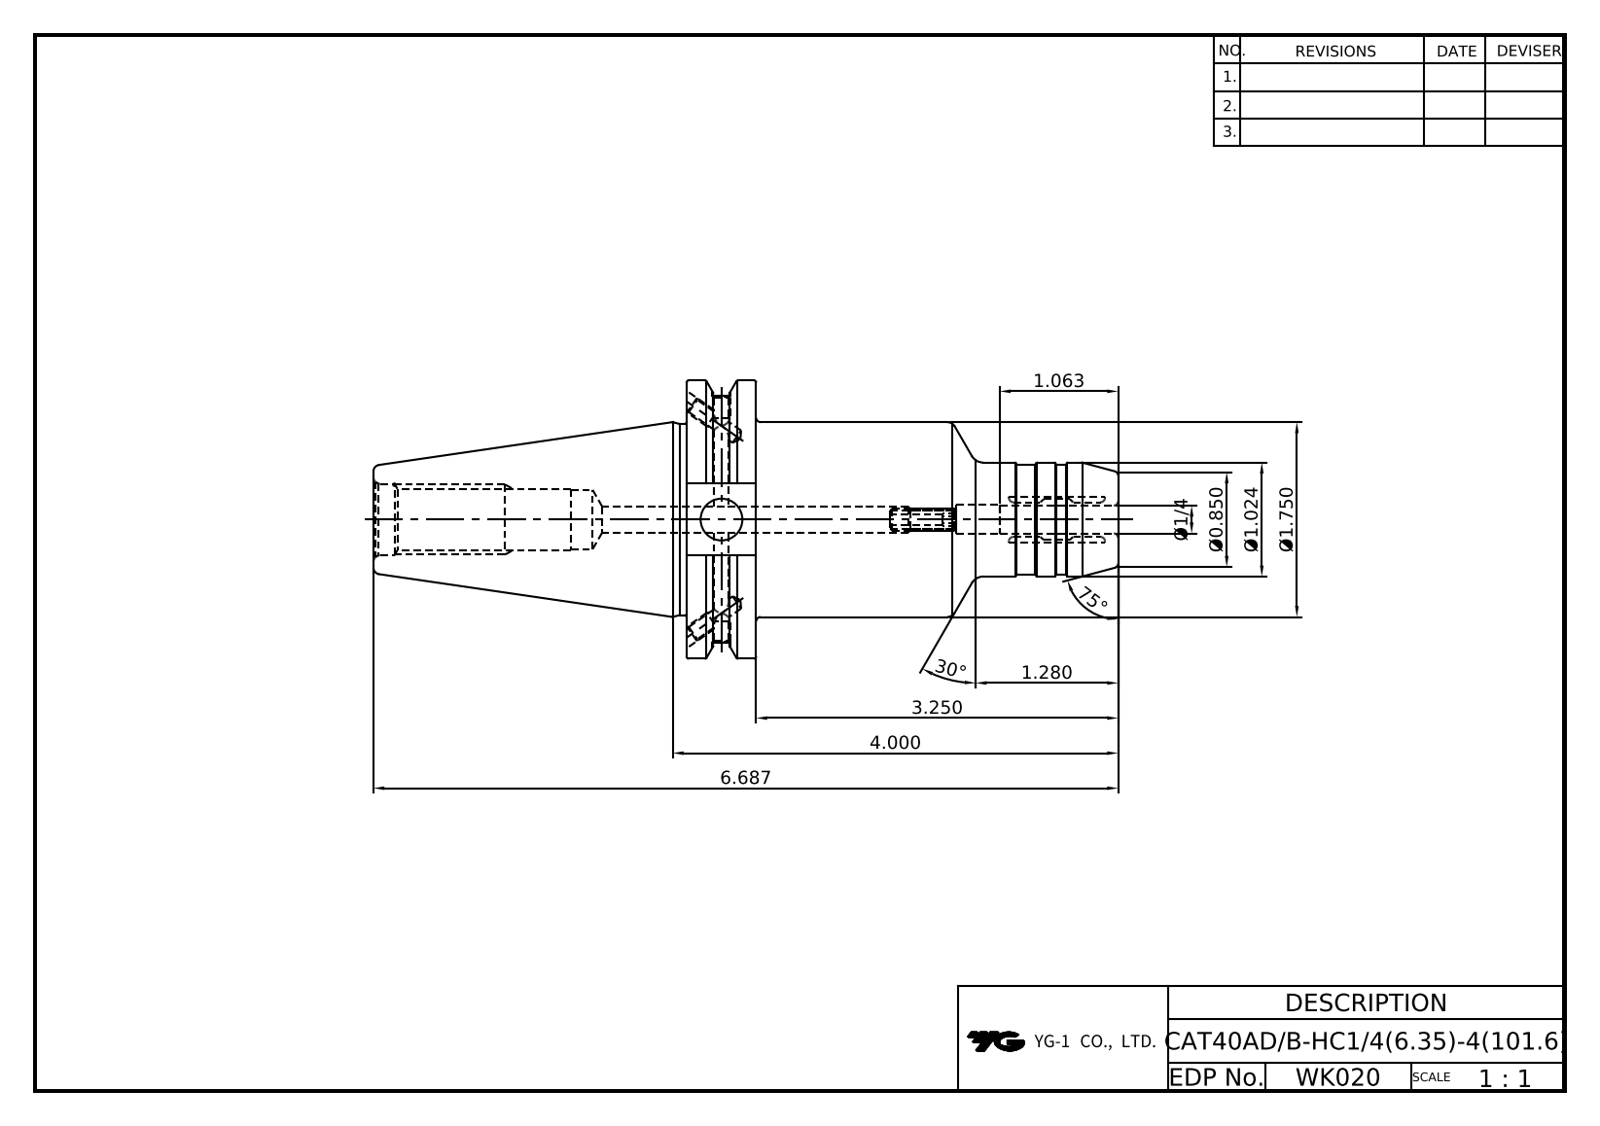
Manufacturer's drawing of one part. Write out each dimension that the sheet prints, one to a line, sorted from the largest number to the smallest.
75°
30°
6.687
4.000
3.250
Ø1.750
1.280
1.063
Ø1.024
Ø0.850
Ø1/4
